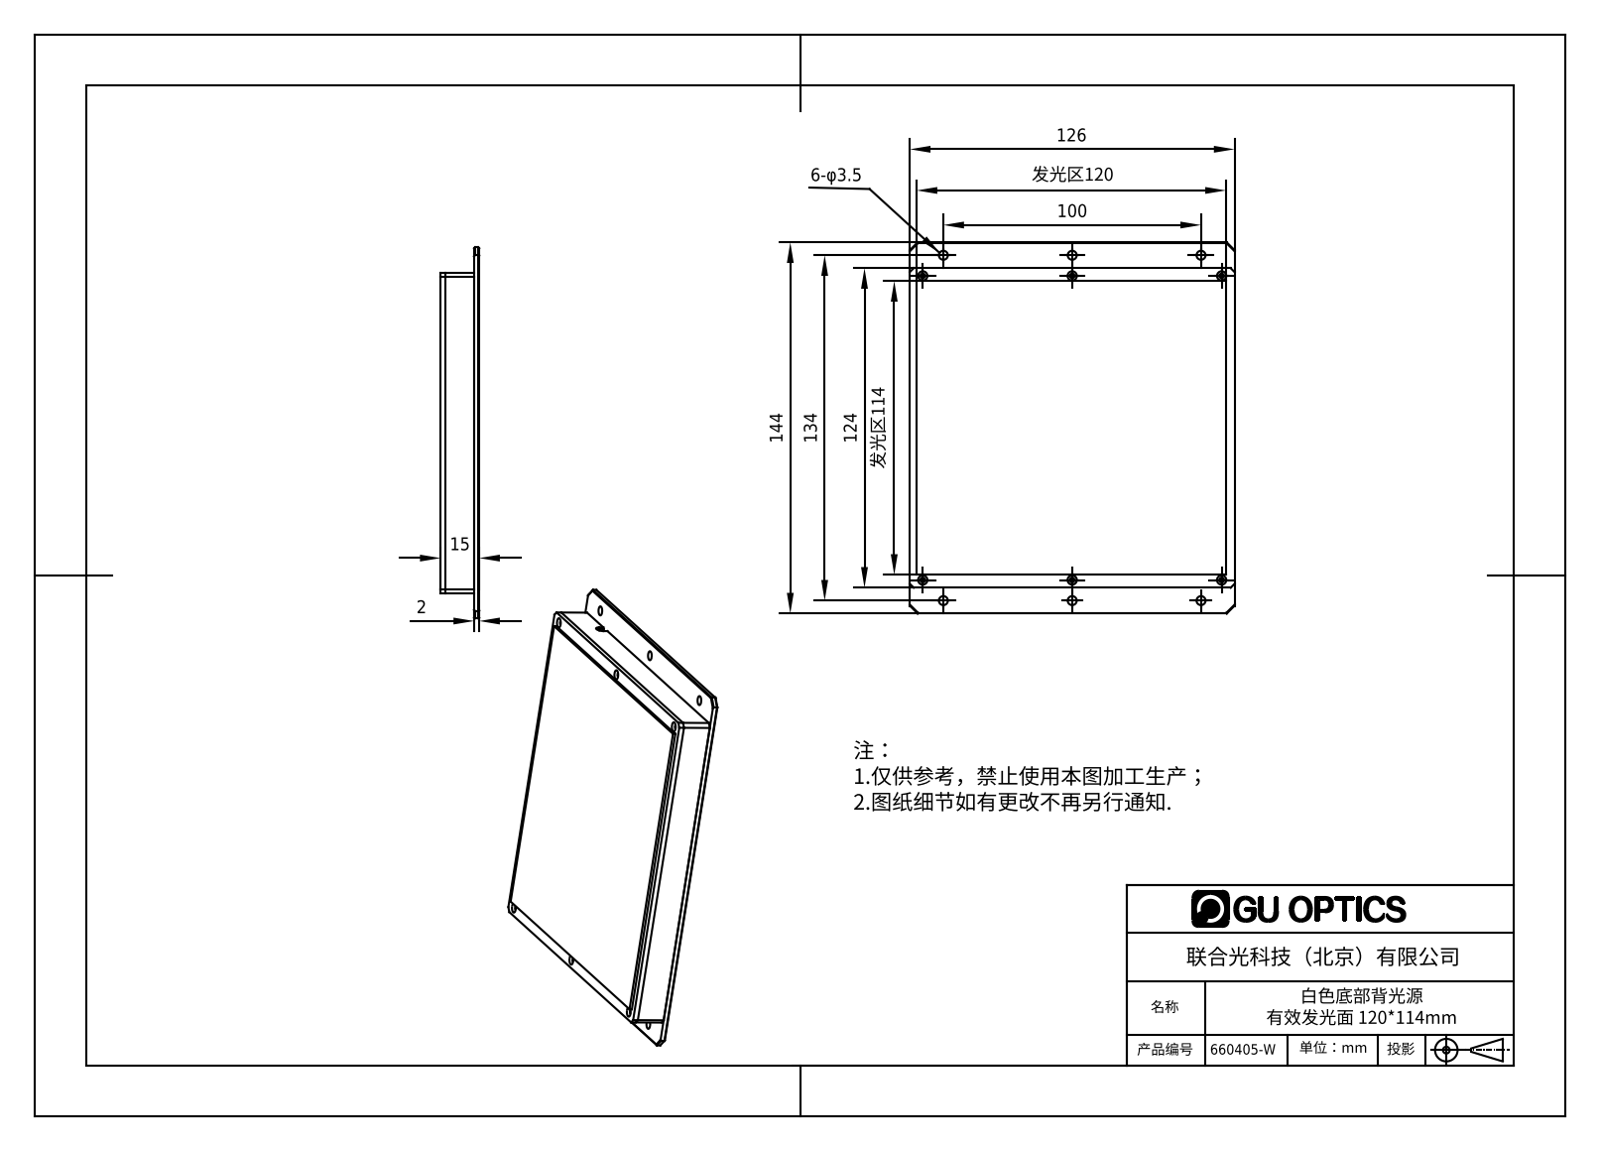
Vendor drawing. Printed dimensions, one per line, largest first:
144
134
126
124
发光区120
发光区114
100
15
2
